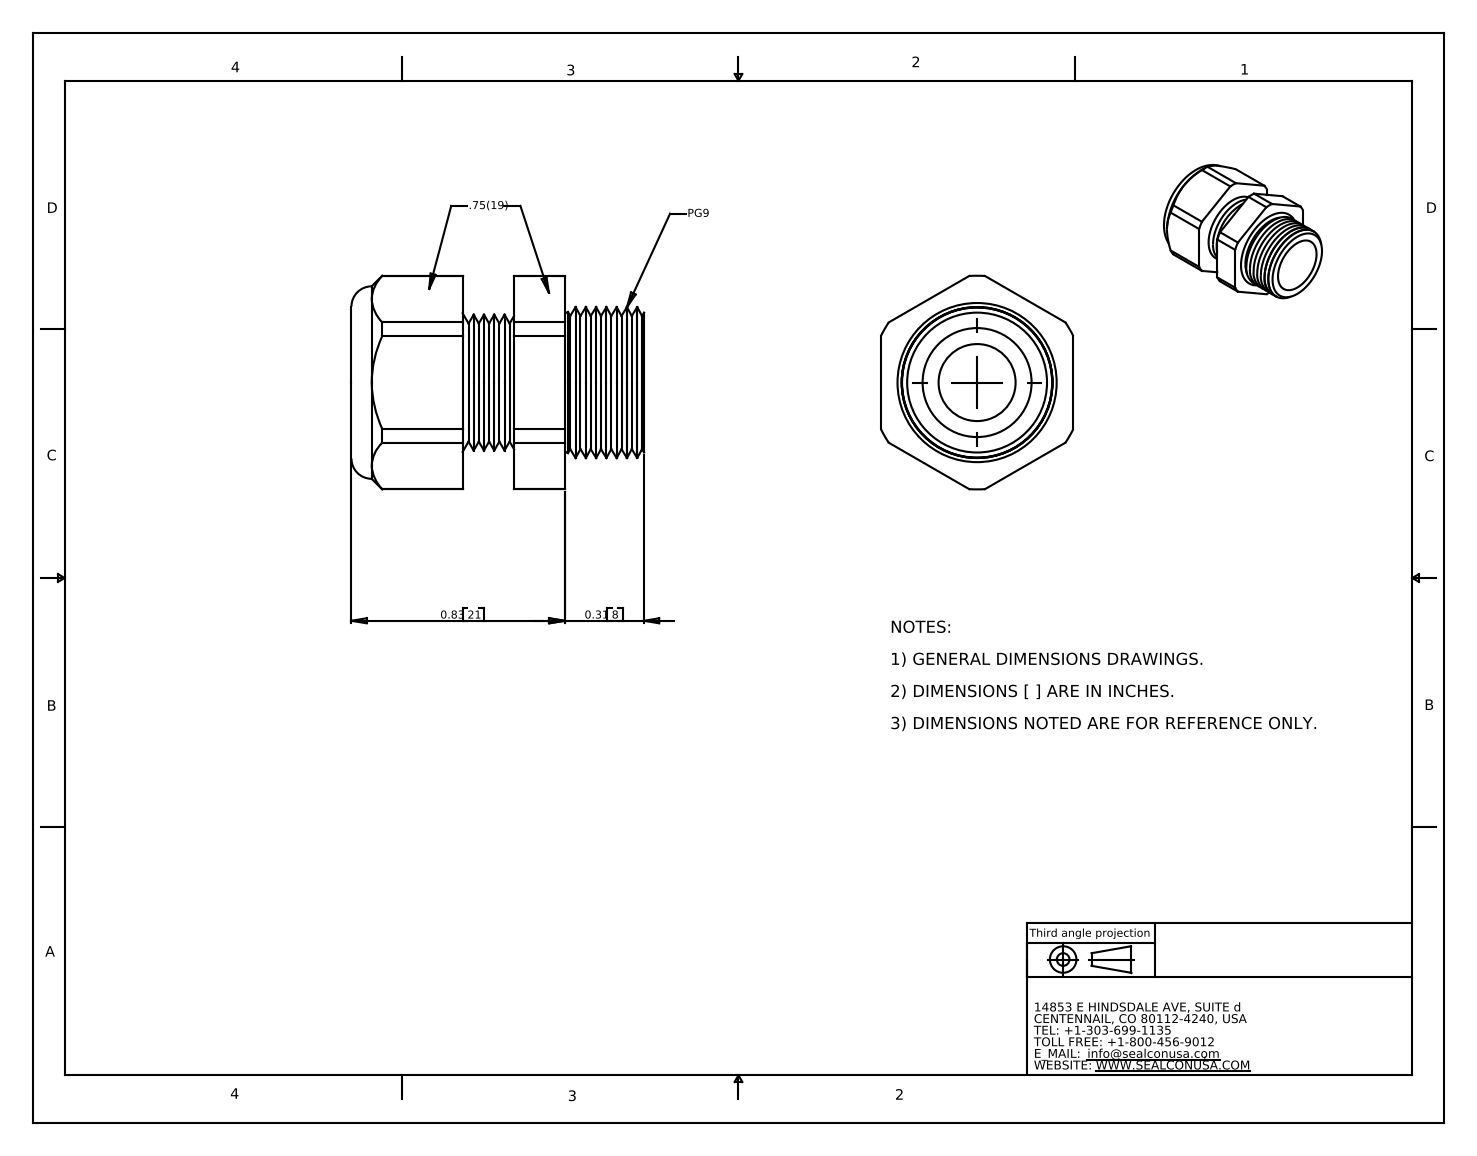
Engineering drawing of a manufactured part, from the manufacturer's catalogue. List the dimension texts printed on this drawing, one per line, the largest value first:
0.83 21
0.31 8
